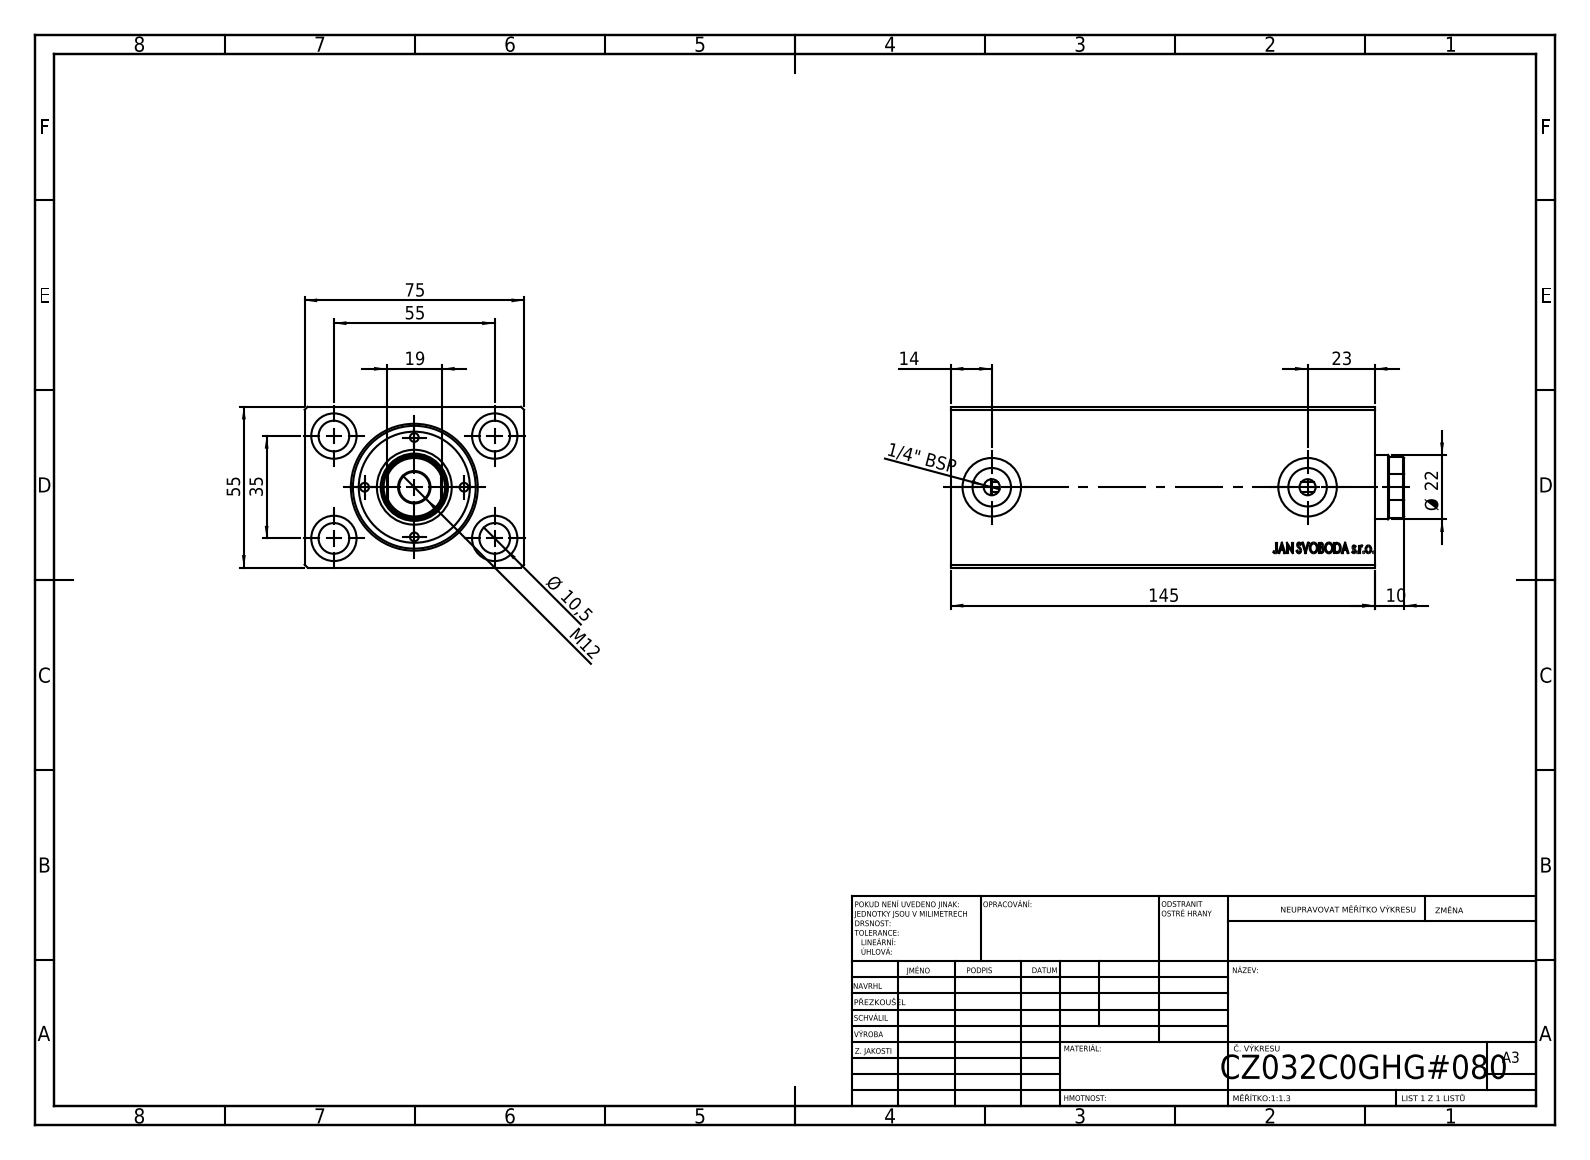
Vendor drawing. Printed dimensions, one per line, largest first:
145
75
55
55
35
23
Ø 22
19
14
M12
Ø 10,5
10
1/4" BSP
